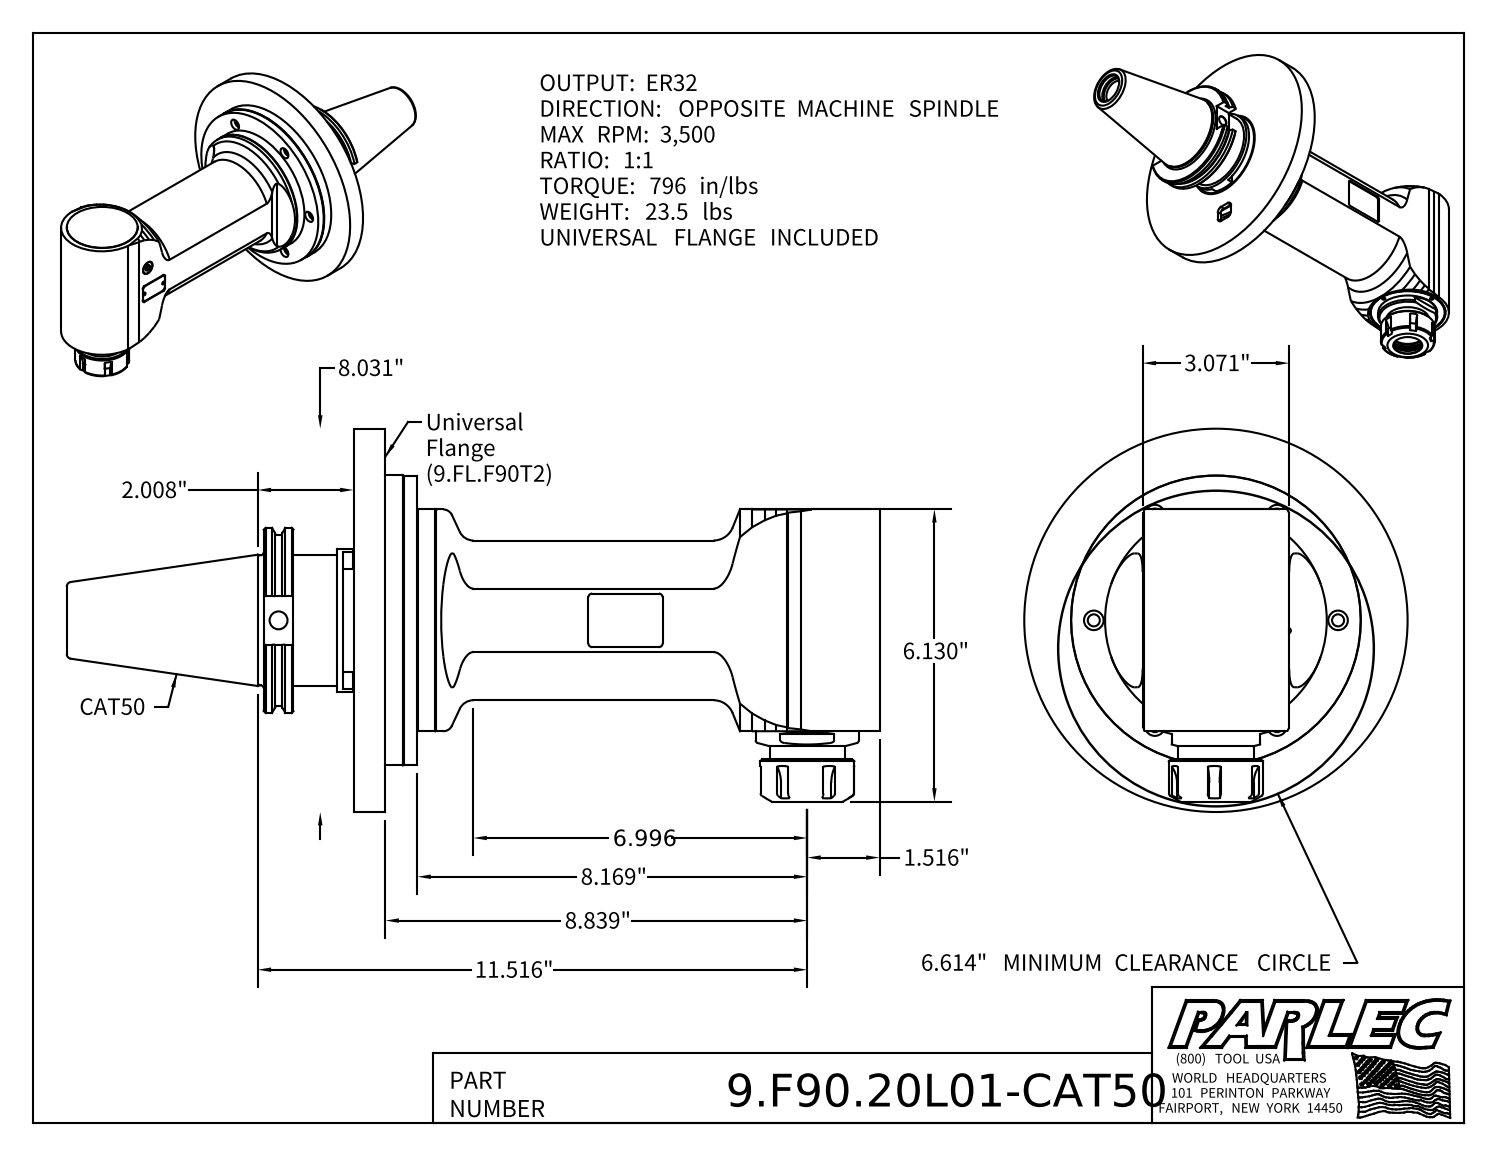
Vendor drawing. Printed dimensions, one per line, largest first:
11.516"
8.839"
8.169"
8.031"
6.996
6.130"
3.071"
2.008"
1.516"
